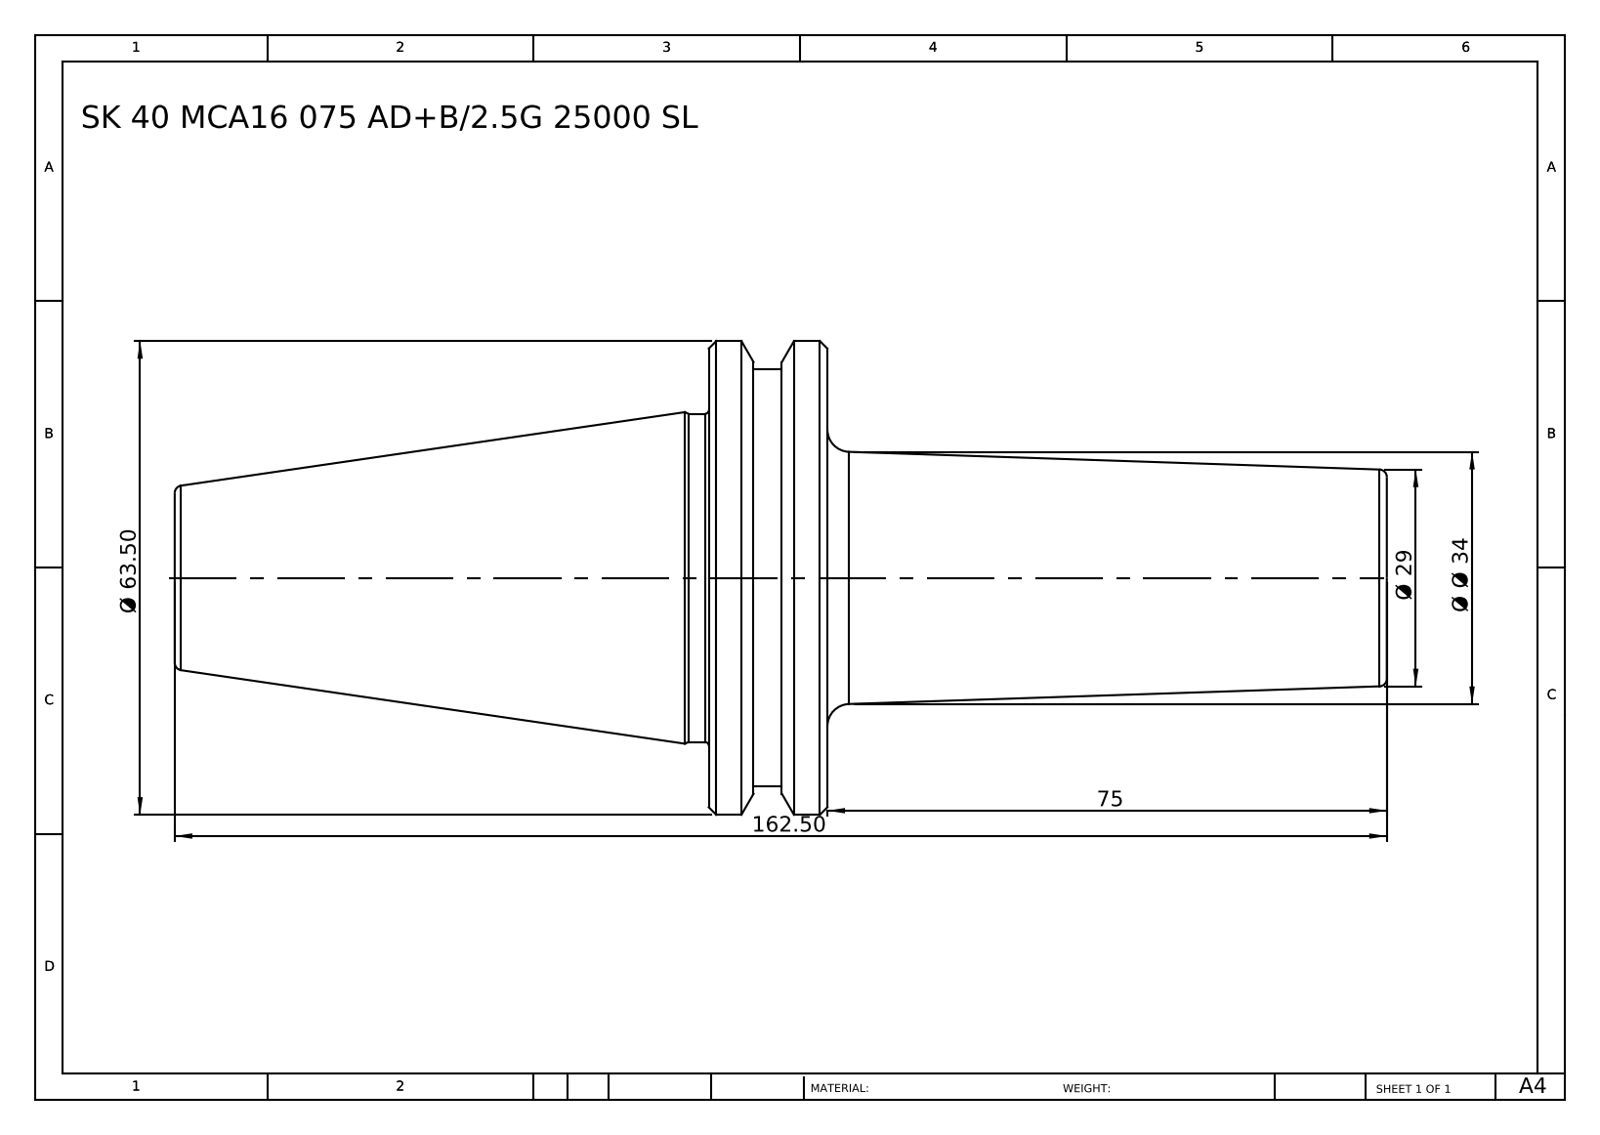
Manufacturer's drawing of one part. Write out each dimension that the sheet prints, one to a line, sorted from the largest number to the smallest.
162.50
75
Ø 63.50
Ø Ø 34
Ø 29
